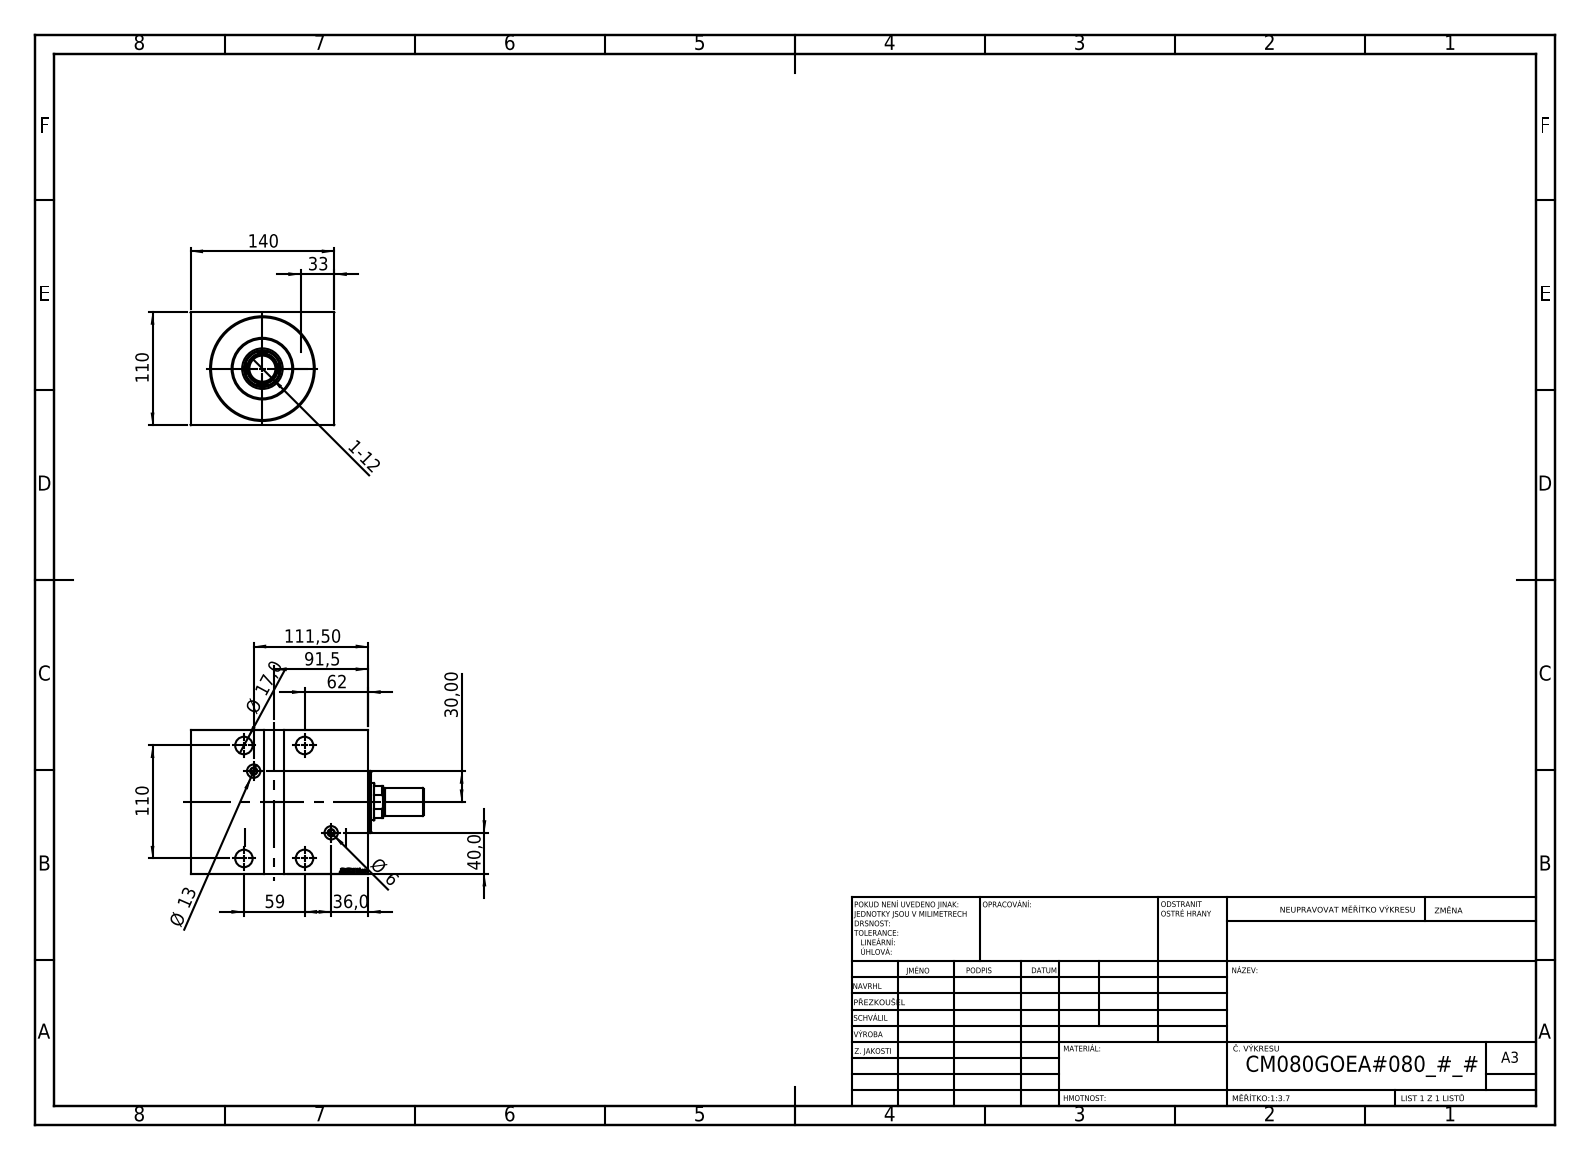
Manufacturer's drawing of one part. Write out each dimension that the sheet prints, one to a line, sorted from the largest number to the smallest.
140
111,50
110
110
91,5
62
59
40,0
36,0
33
30,00
Ø 17,0
Ø 13
Ø 6
1-12
